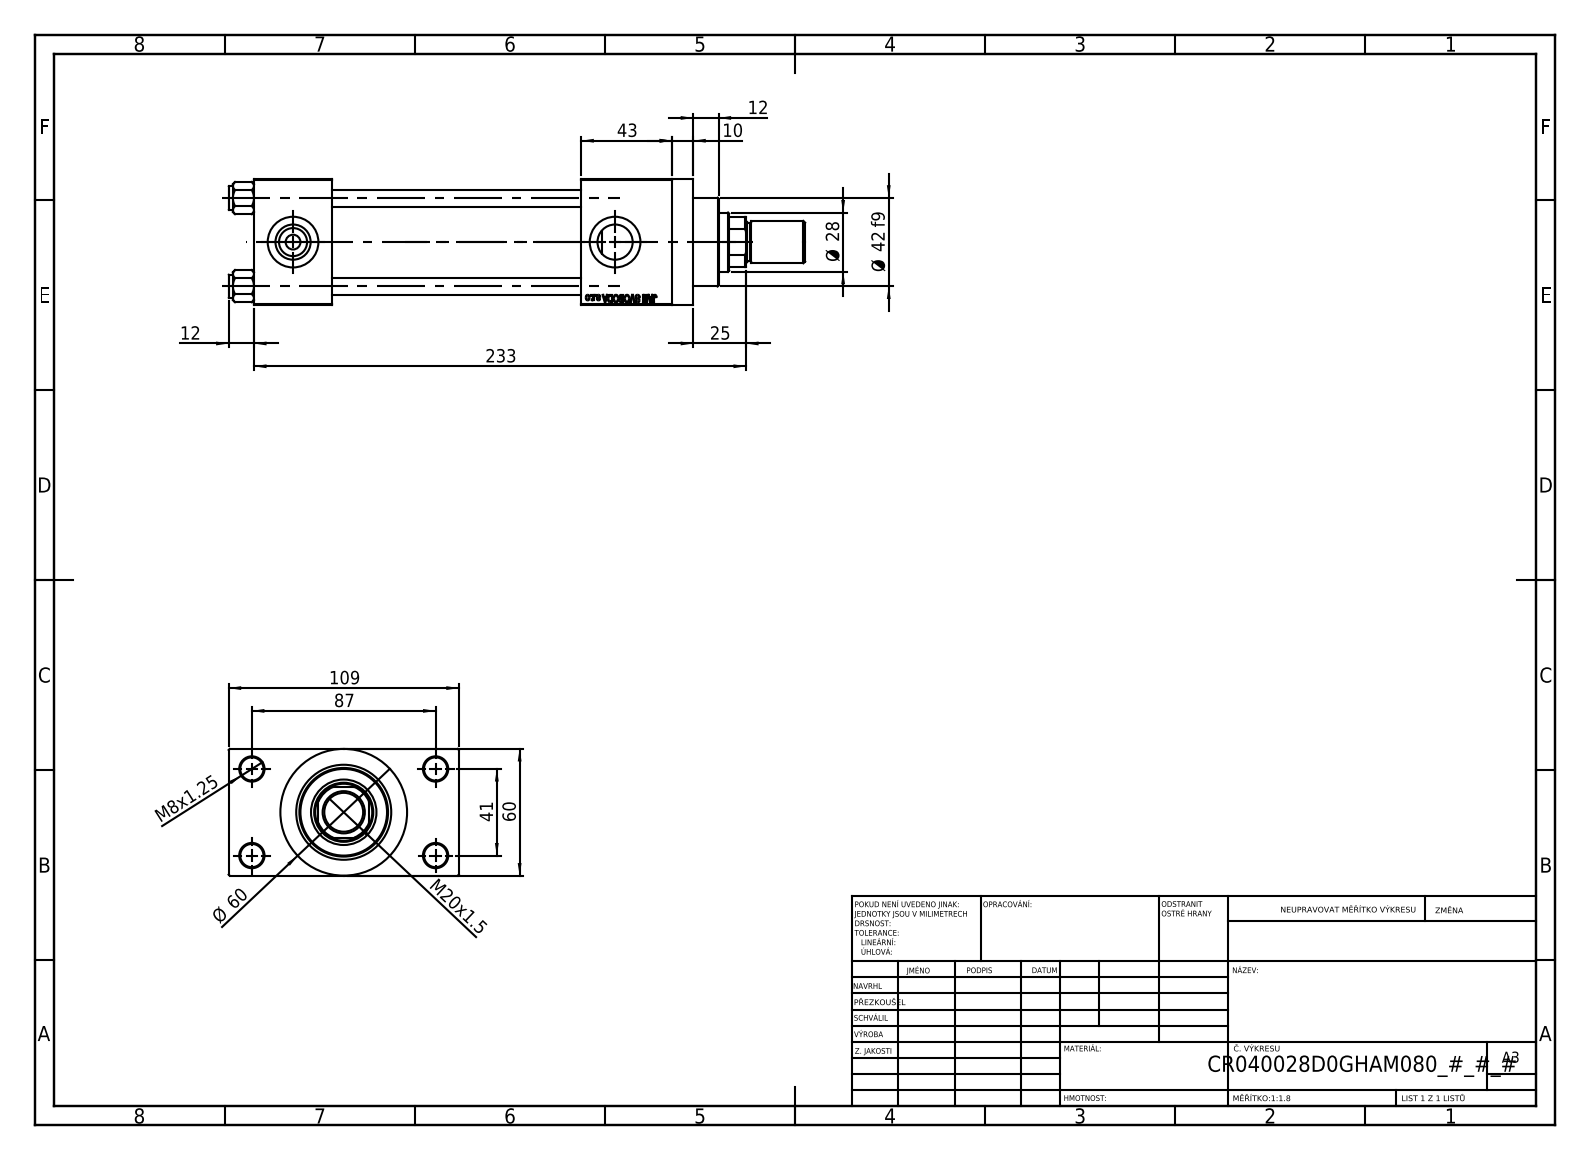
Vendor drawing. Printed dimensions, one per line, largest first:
233
109
87
Ø 60
60
43
Ø 42 f9
41
Ø 28
25
M20x1.5
12
12
10
M8x1.25
